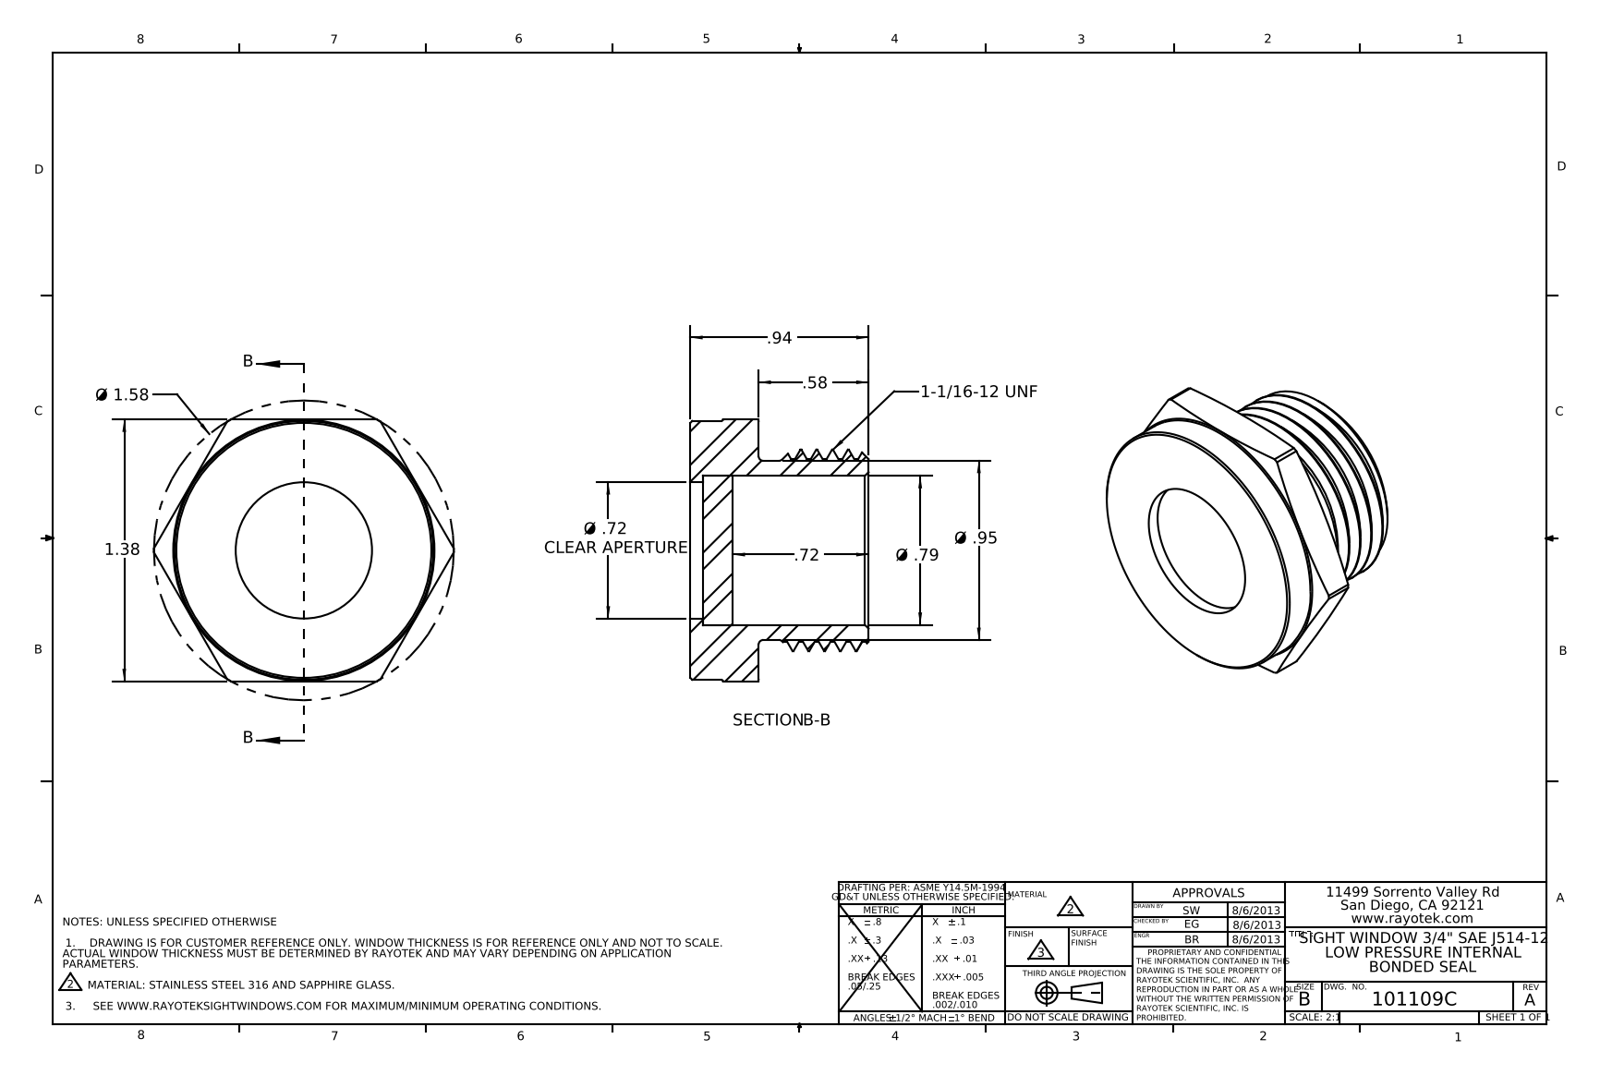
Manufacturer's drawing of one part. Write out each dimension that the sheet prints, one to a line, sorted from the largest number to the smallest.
Ø 1.58
1.38
Ø .95
.94
Ø .79
.72
Ø .72 CLEAR APERTURE
.58
